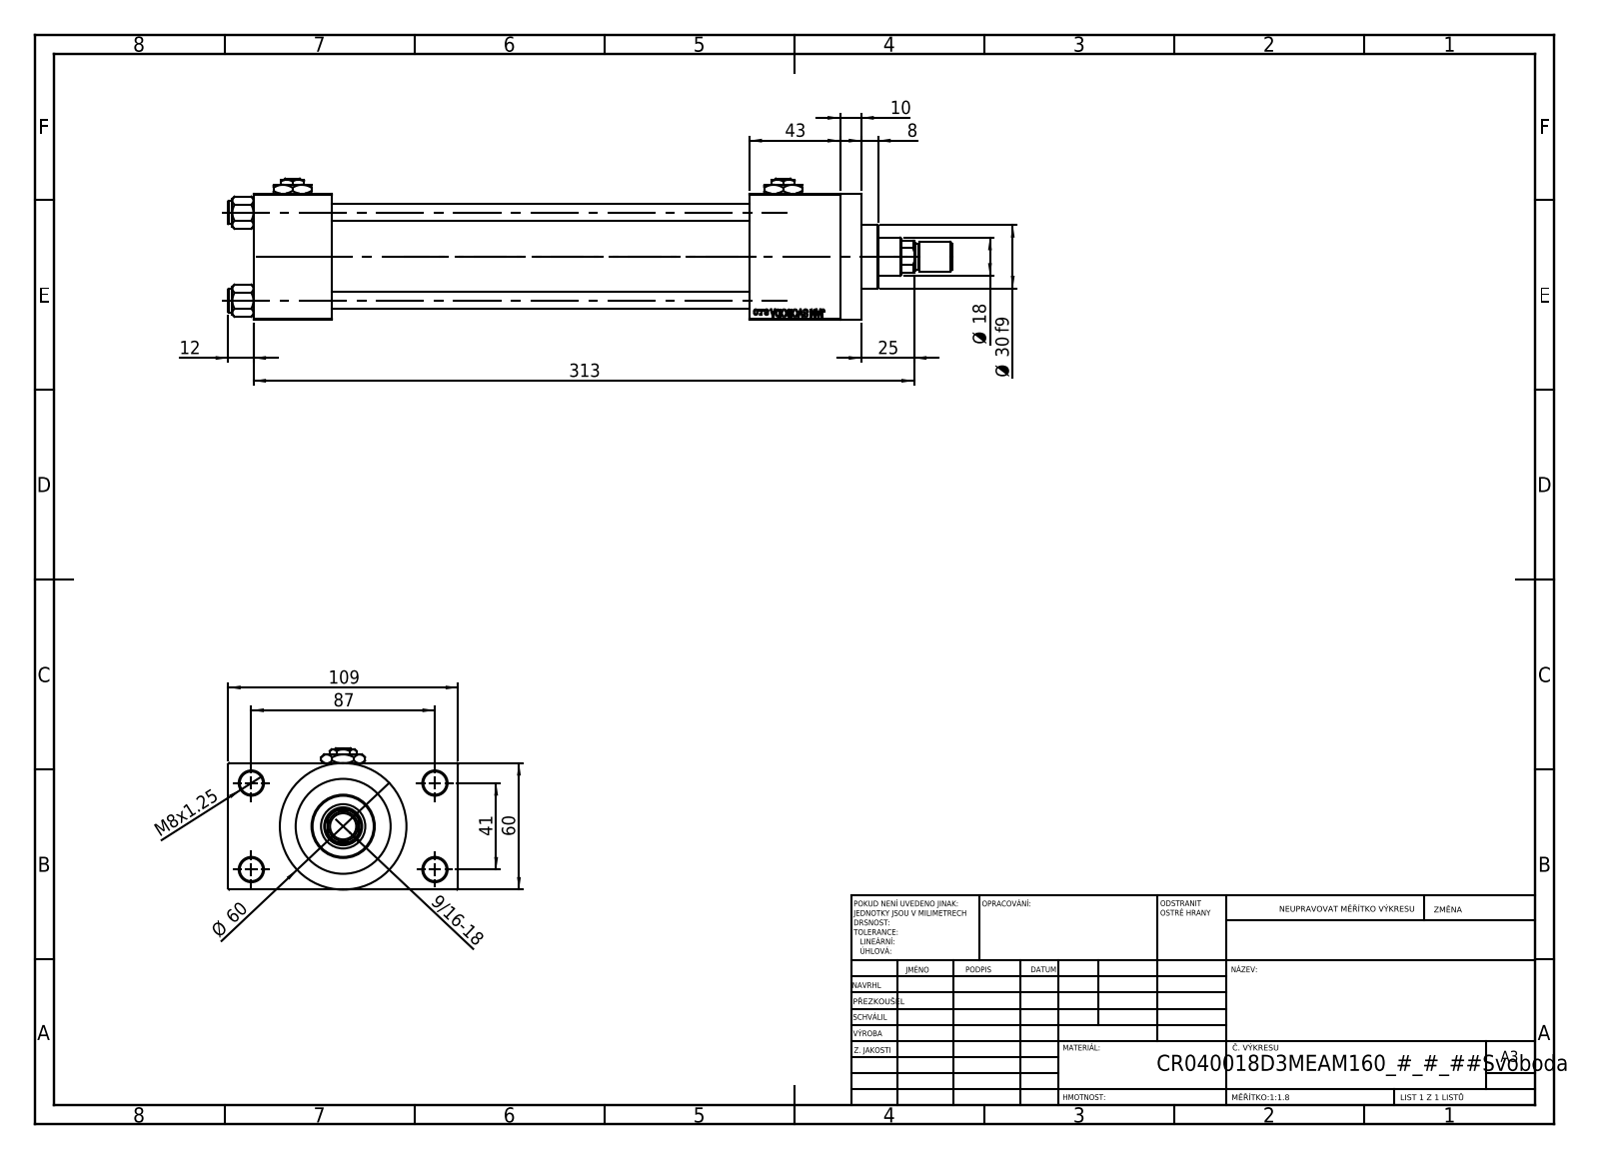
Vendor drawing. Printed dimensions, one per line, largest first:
313
109
87
Ø 60
60
43
41
Ø 30 f9
25
Ø 18
12
10
8
M8x1.25
9/16-18
